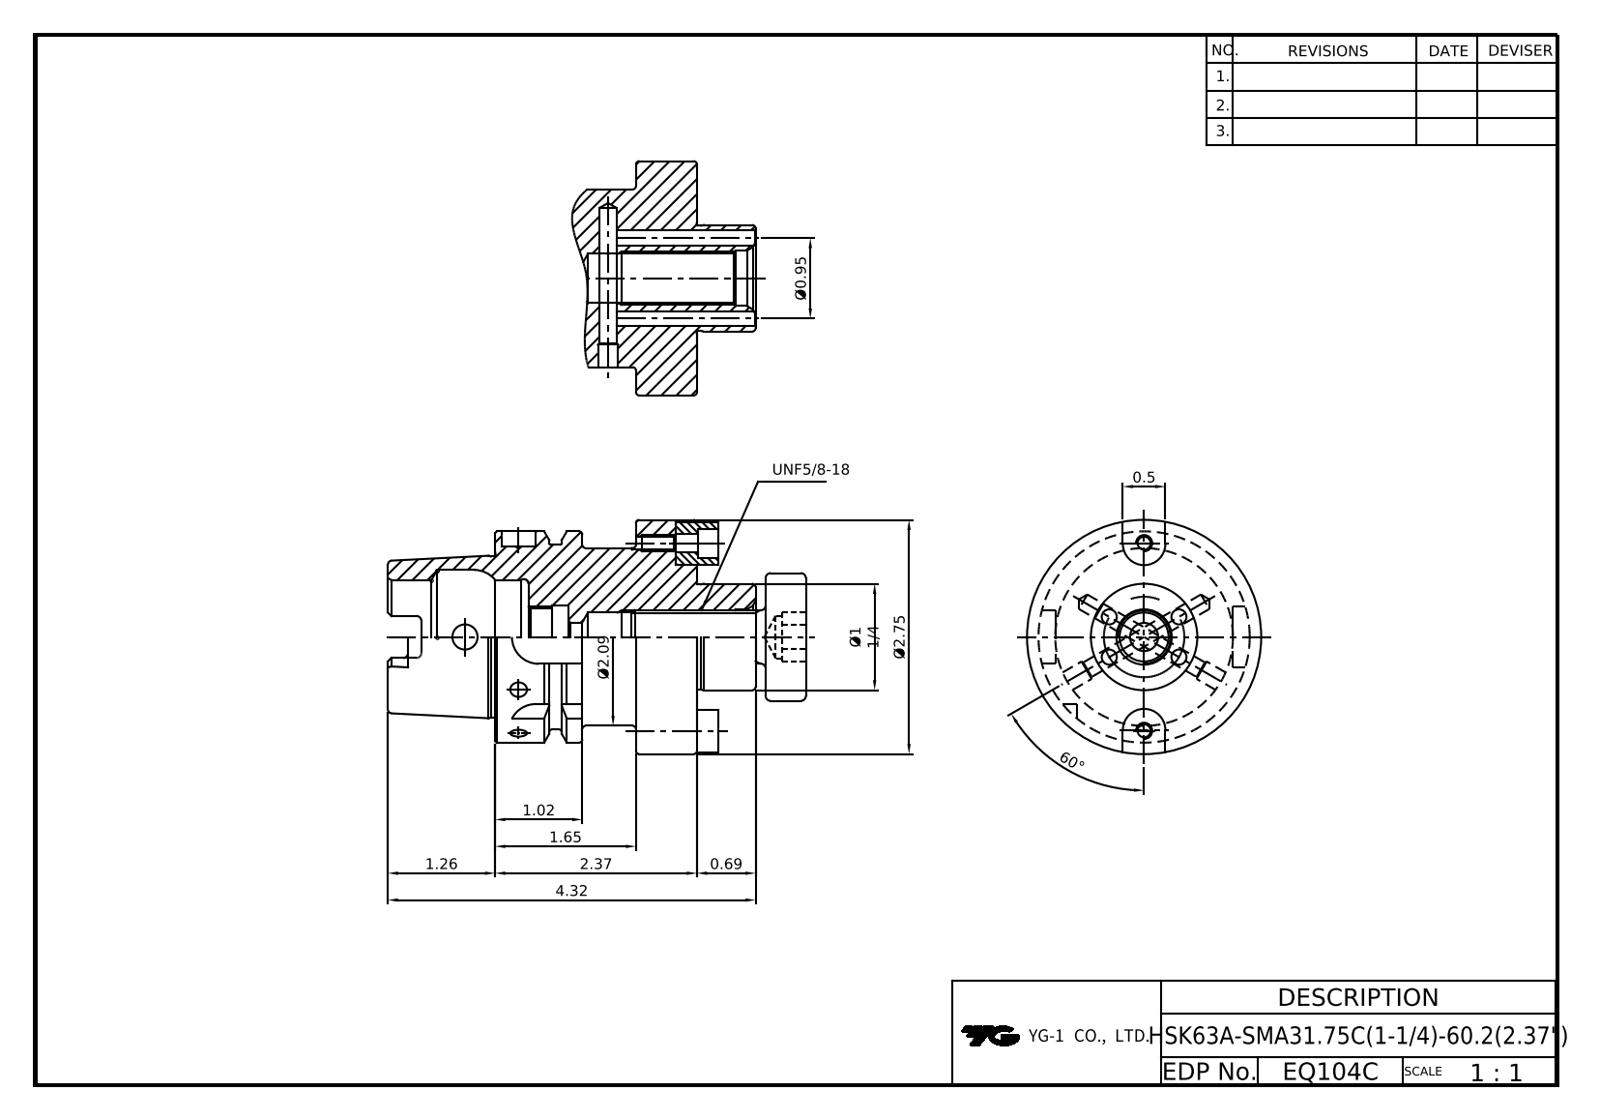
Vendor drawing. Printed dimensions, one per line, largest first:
60°
4.32
Ø2.75
2.37
Ø2.09
1.65
1.26
Ø1 1/4
1.02
Ø0.95
0.69
0.5
